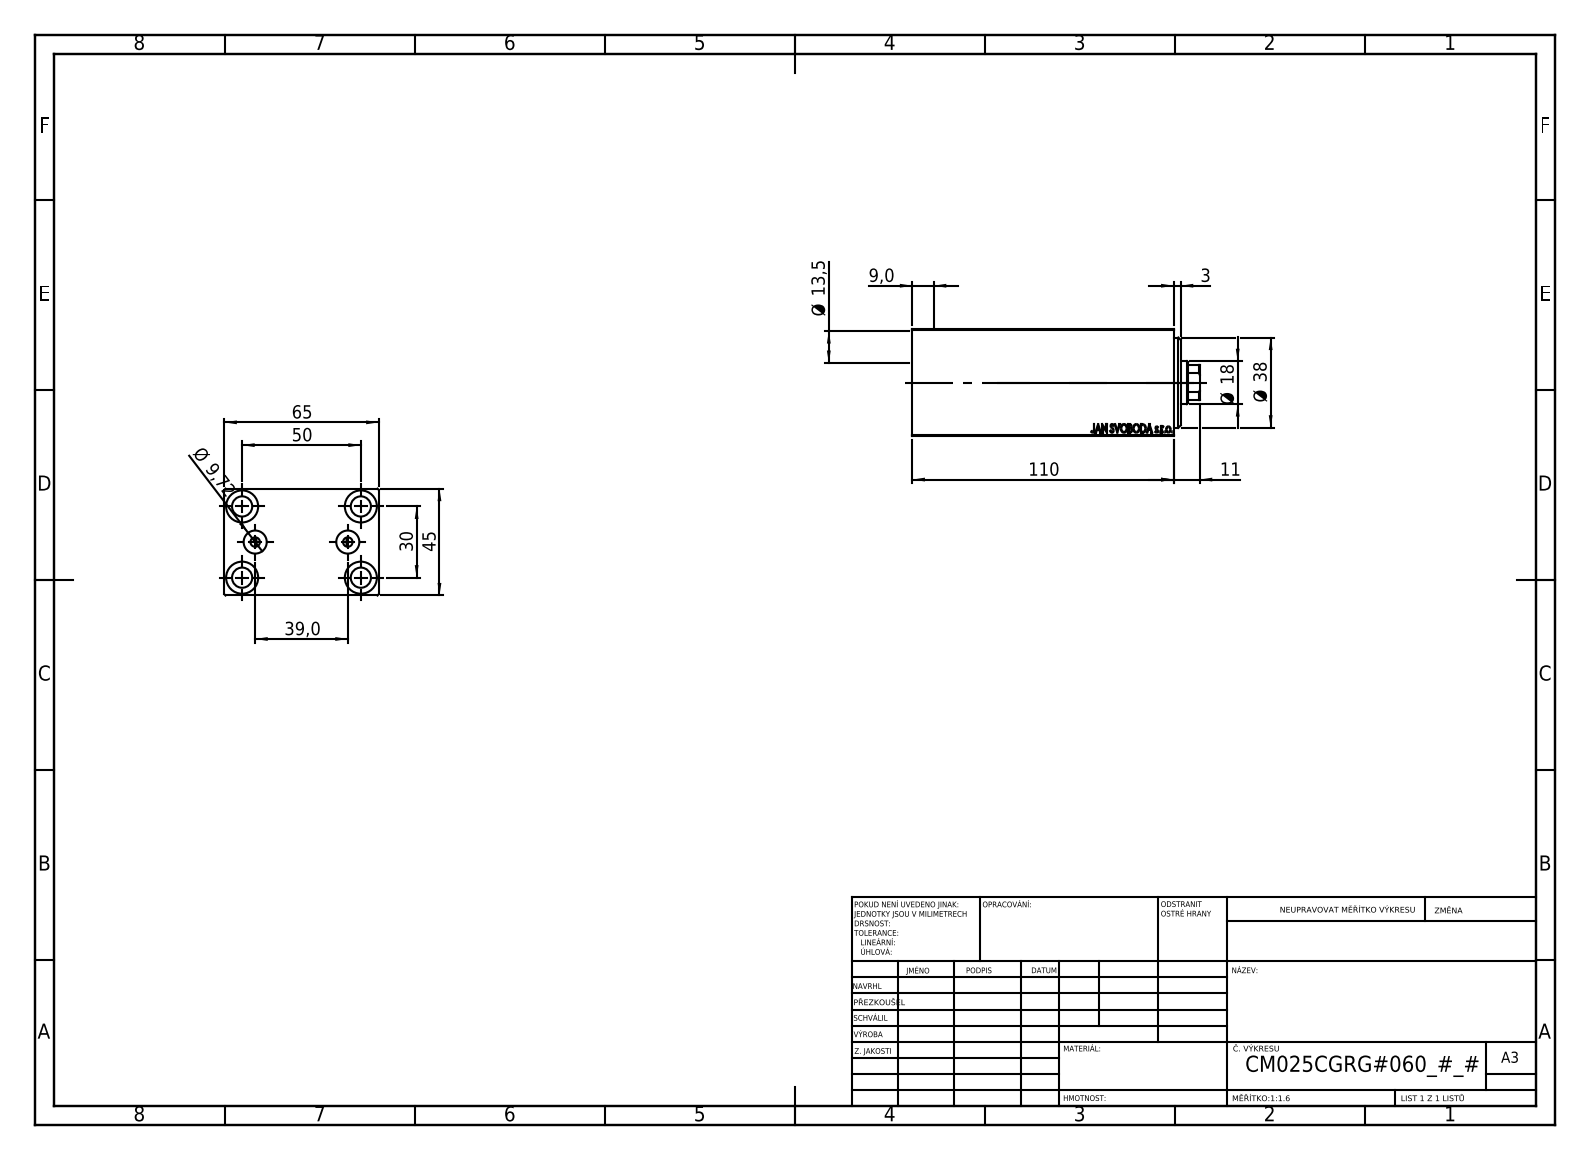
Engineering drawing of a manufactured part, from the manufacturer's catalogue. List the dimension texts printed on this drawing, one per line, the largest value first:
110
65
50
45
39,0
Ø 38
30
Ø 18
Ø 13,5
11
Ø 9,72
9,0
3
